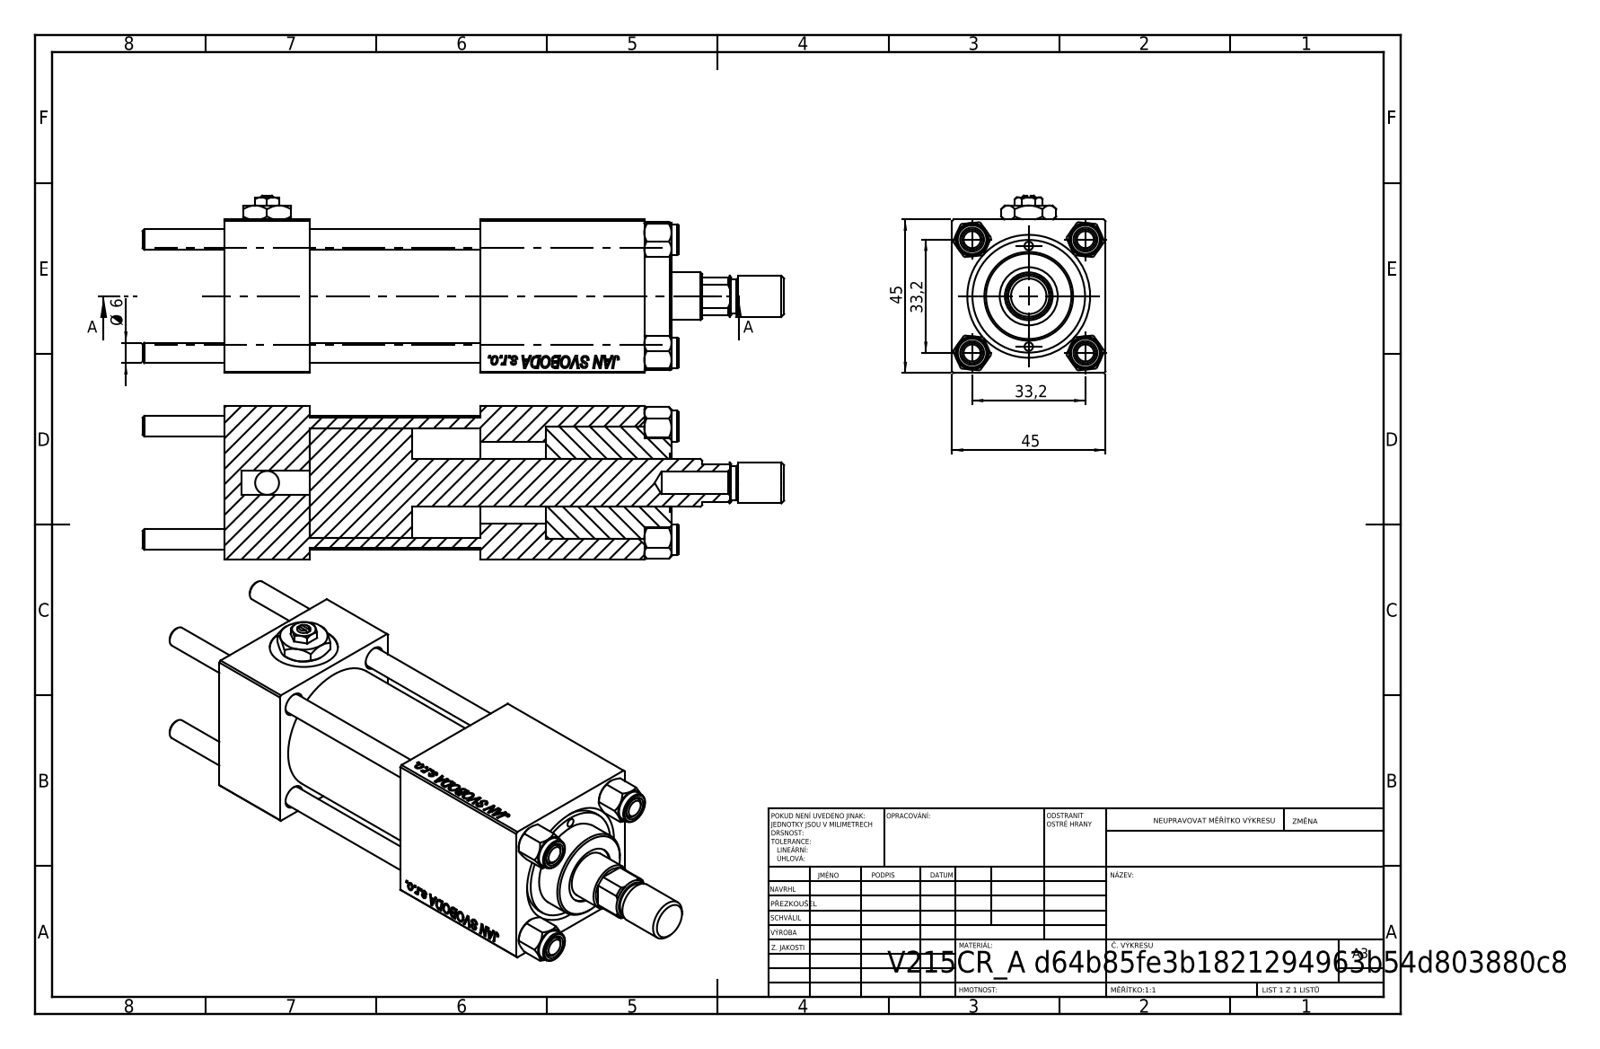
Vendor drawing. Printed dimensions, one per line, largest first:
45
45
33,2
33,2
Ø 6
